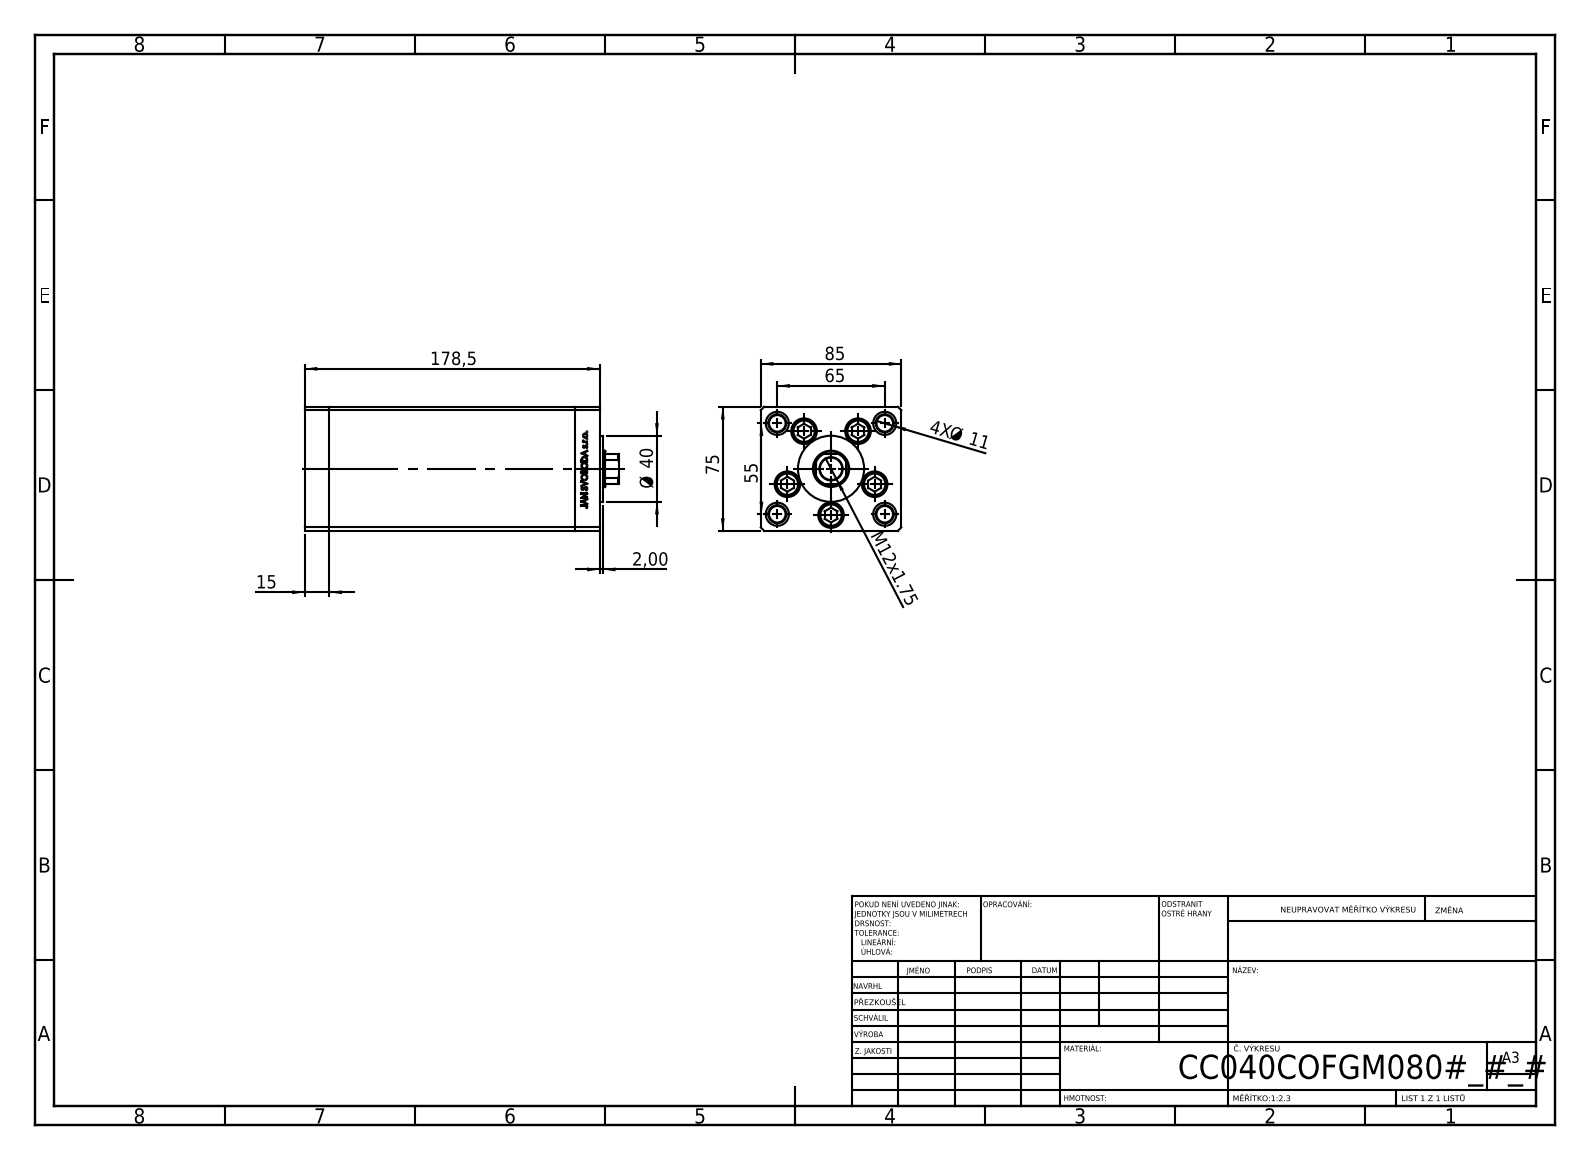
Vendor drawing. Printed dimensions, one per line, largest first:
178,5
85
75
65
55
Ø 40
15
M12x1.75
4X Ø 11
2,00
